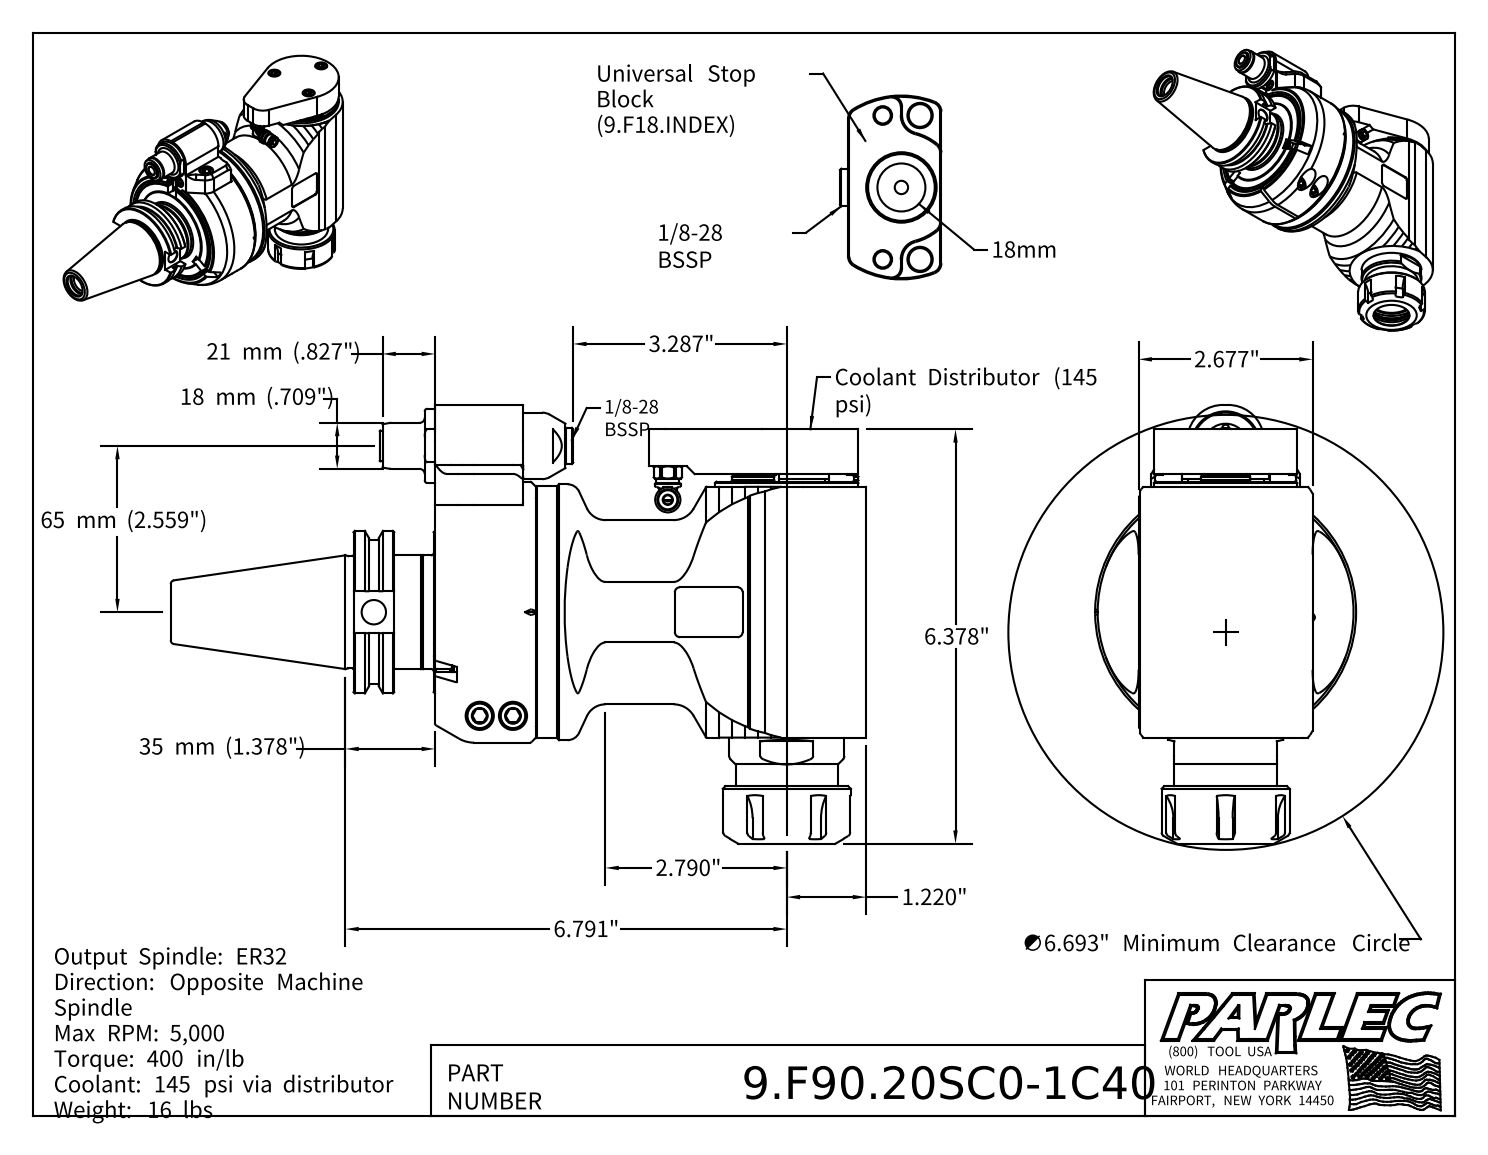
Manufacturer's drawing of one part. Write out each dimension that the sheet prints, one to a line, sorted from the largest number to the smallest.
65 mm (2.559")
35 mm (1.378")
21 mm (.827")
18 mm (.709")
6.791"
∅6.693" Minimum Clearance Circle
6.378"
3.287"
2.790"
2.677"
1.220"
